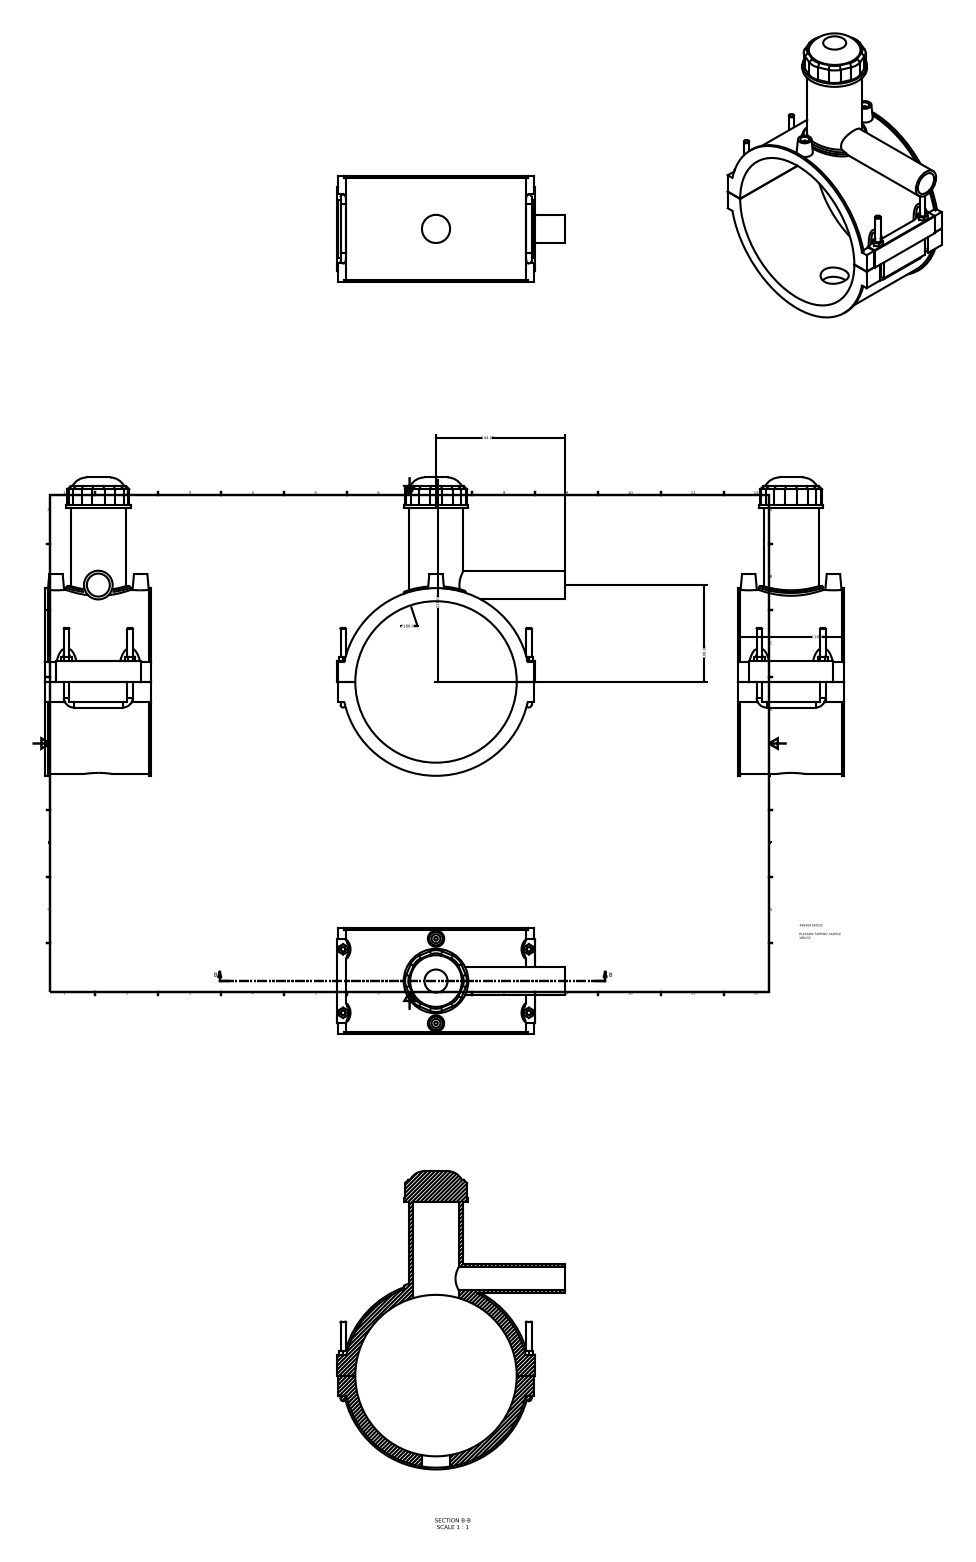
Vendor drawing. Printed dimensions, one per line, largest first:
228.00
∅180.00
144.00
118.00
108.00
